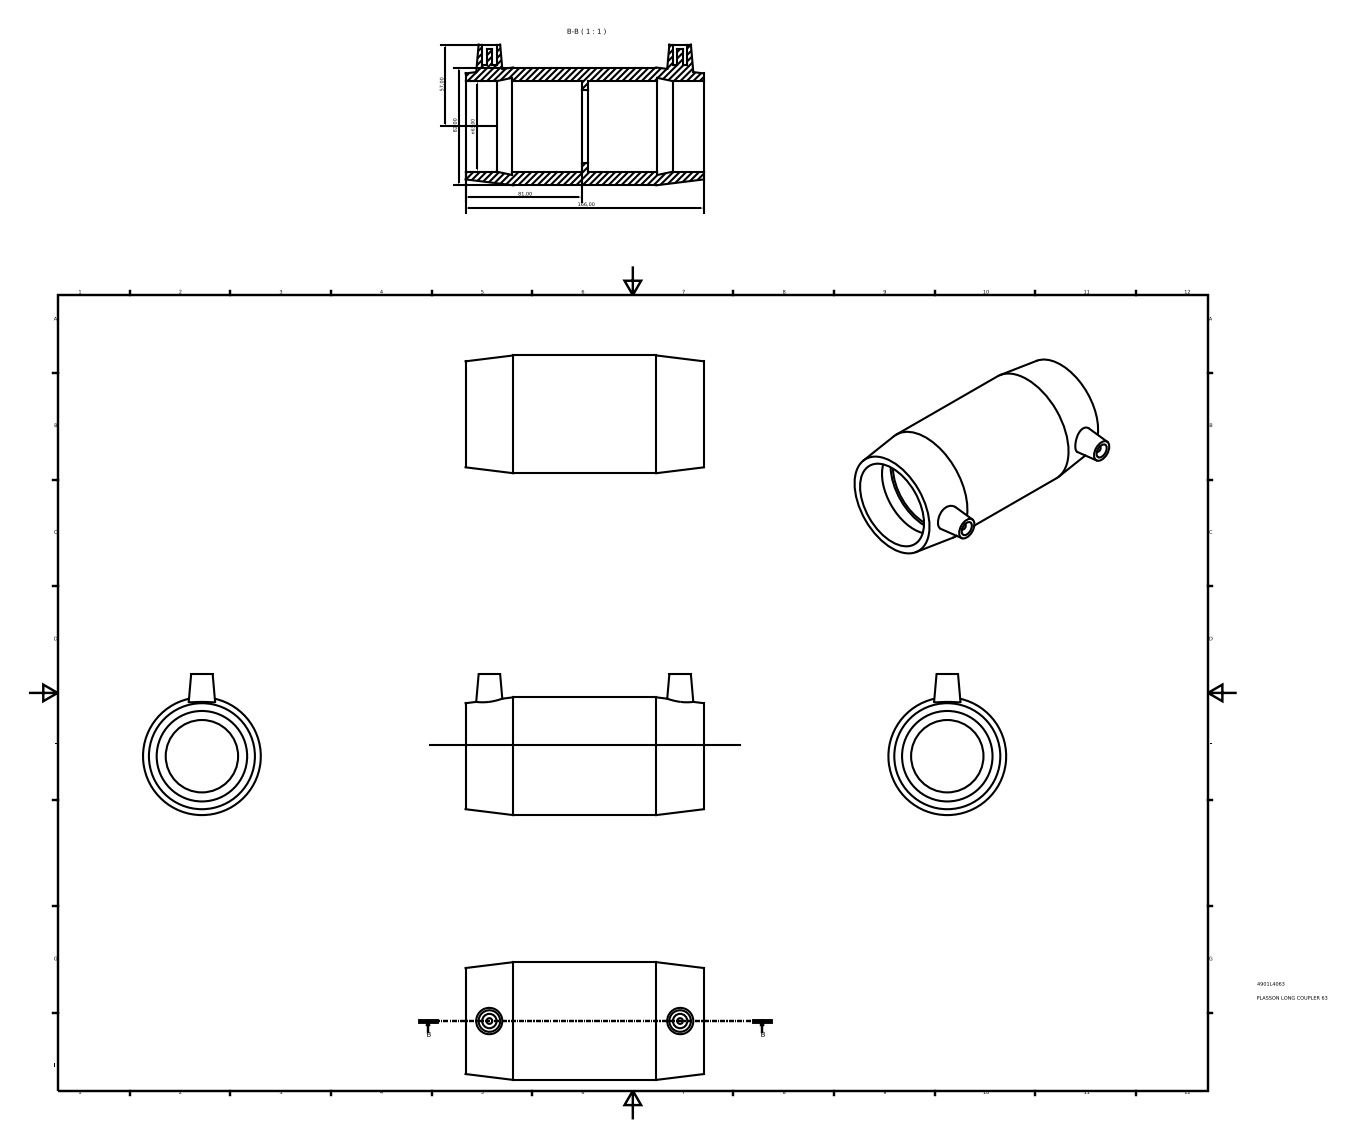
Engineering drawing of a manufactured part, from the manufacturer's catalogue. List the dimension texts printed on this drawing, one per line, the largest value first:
166,00
82,00
81,00
n63,00
57,00
